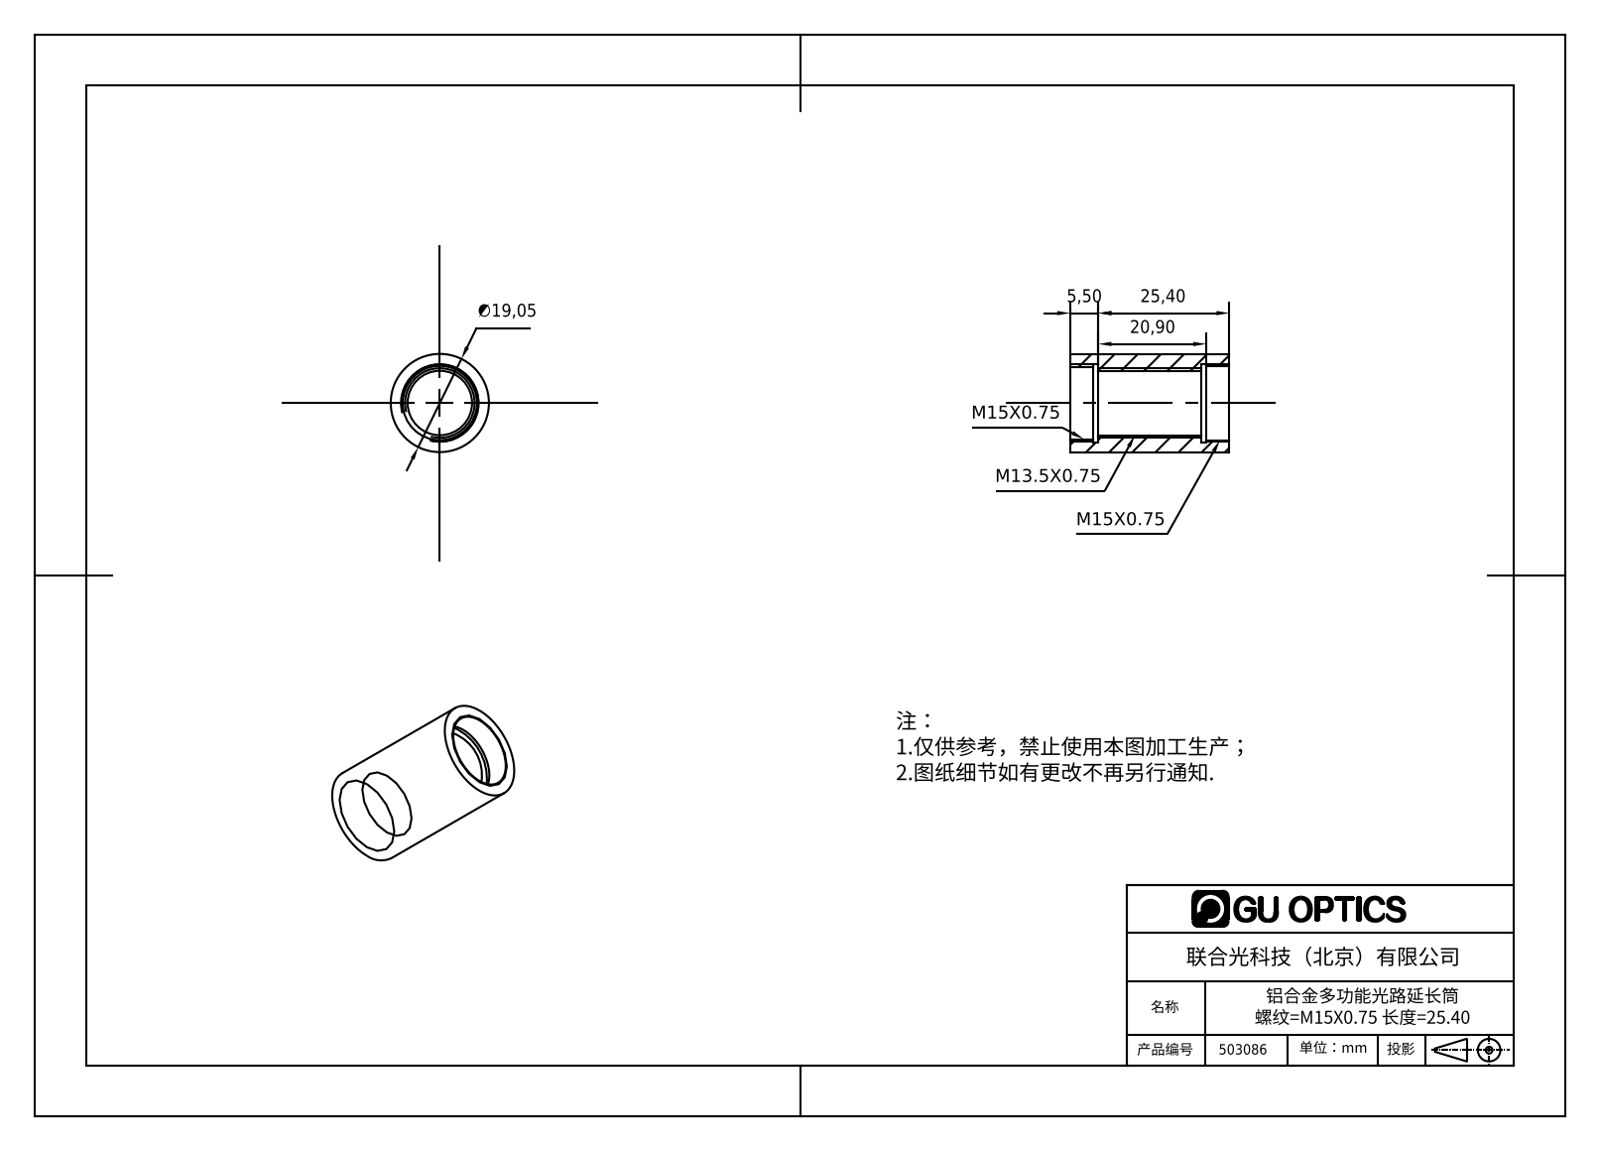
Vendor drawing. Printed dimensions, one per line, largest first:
25,40
20,90
∅19,05
5,50
